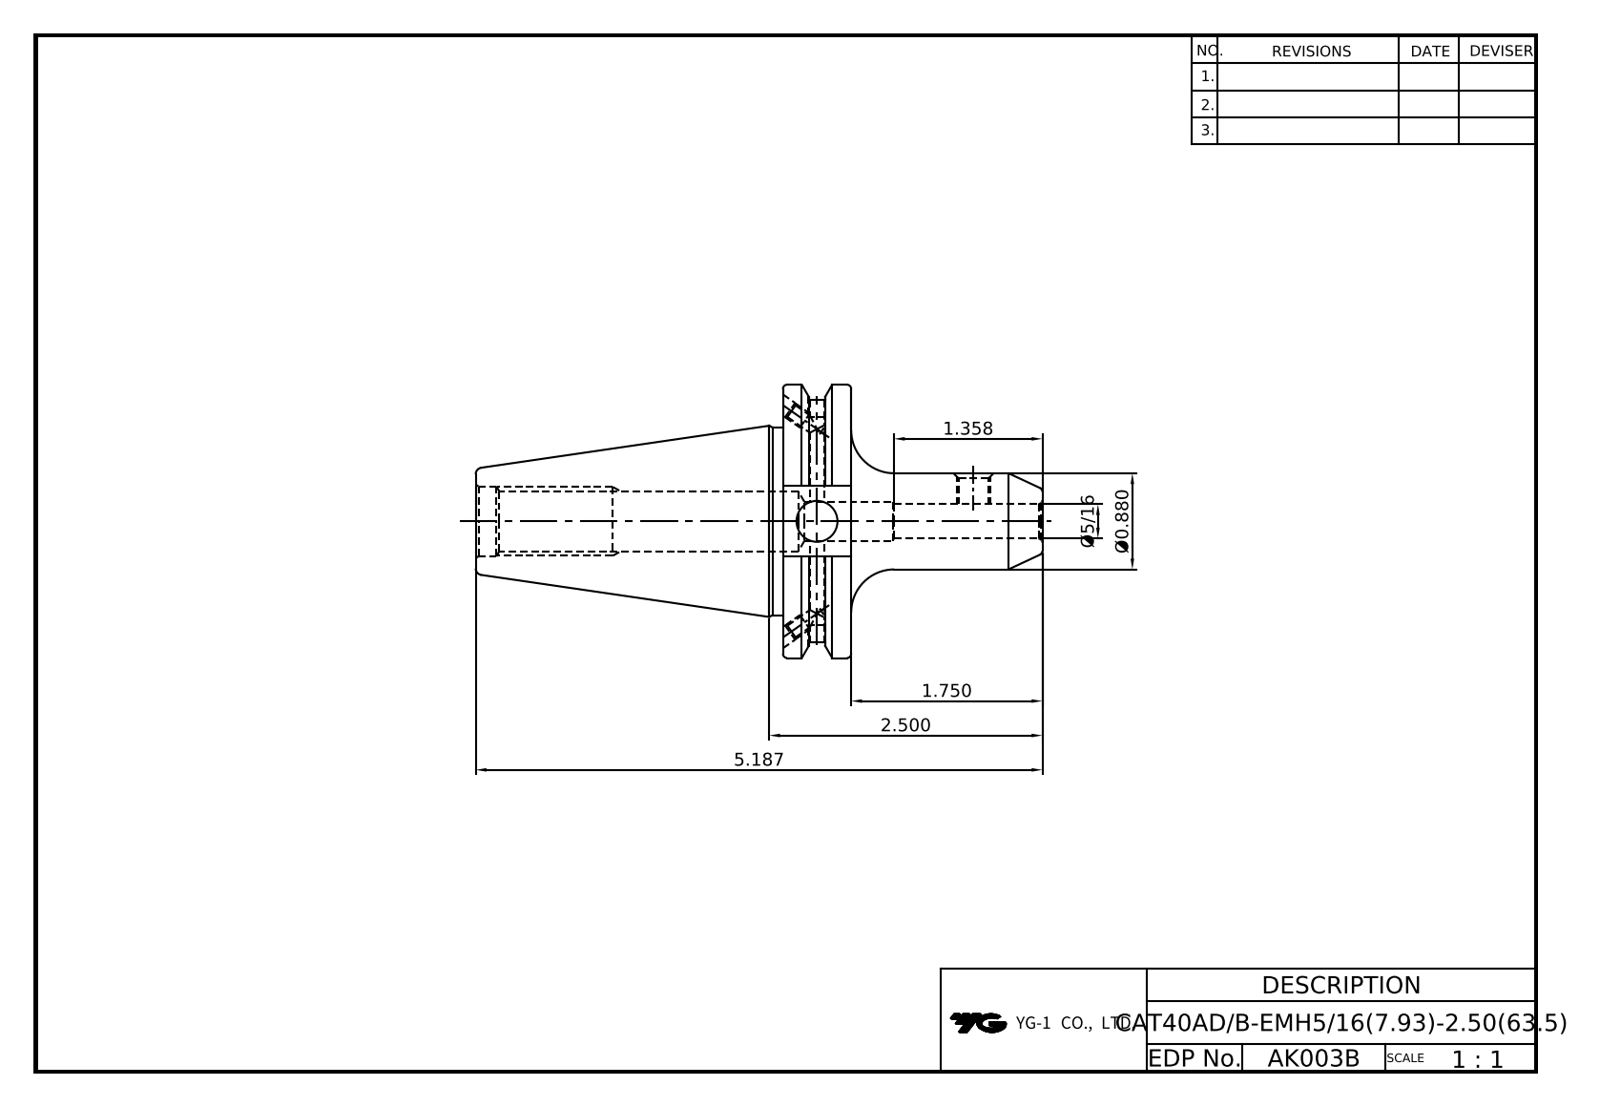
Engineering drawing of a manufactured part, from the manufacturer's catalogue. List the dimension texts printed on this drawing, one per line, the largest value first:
5.187
2.500
1.750
1.358
Ø0.880
Ø5/16
